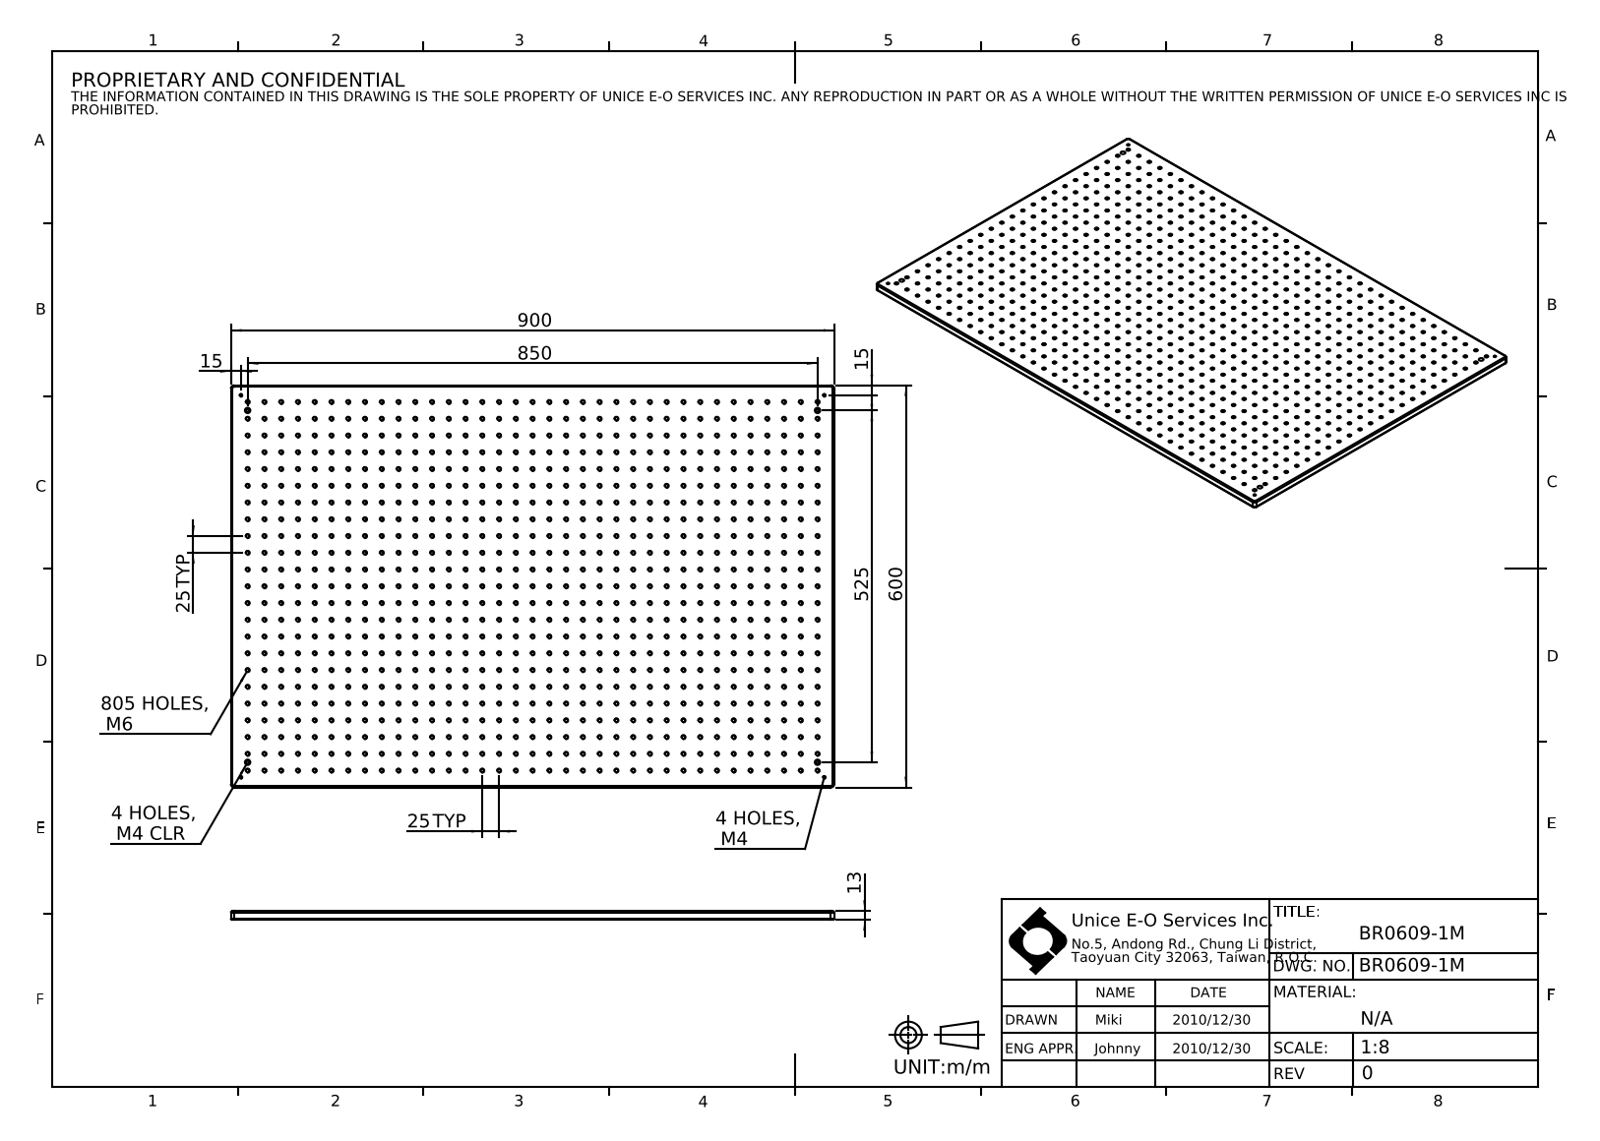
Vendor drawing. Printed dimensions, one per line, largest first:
900
850
805 HOLES, M6
600
525
25 TYP
25 TYP
15
15
13
4 HOLES, M4
4 HOLES, M4 CLR
